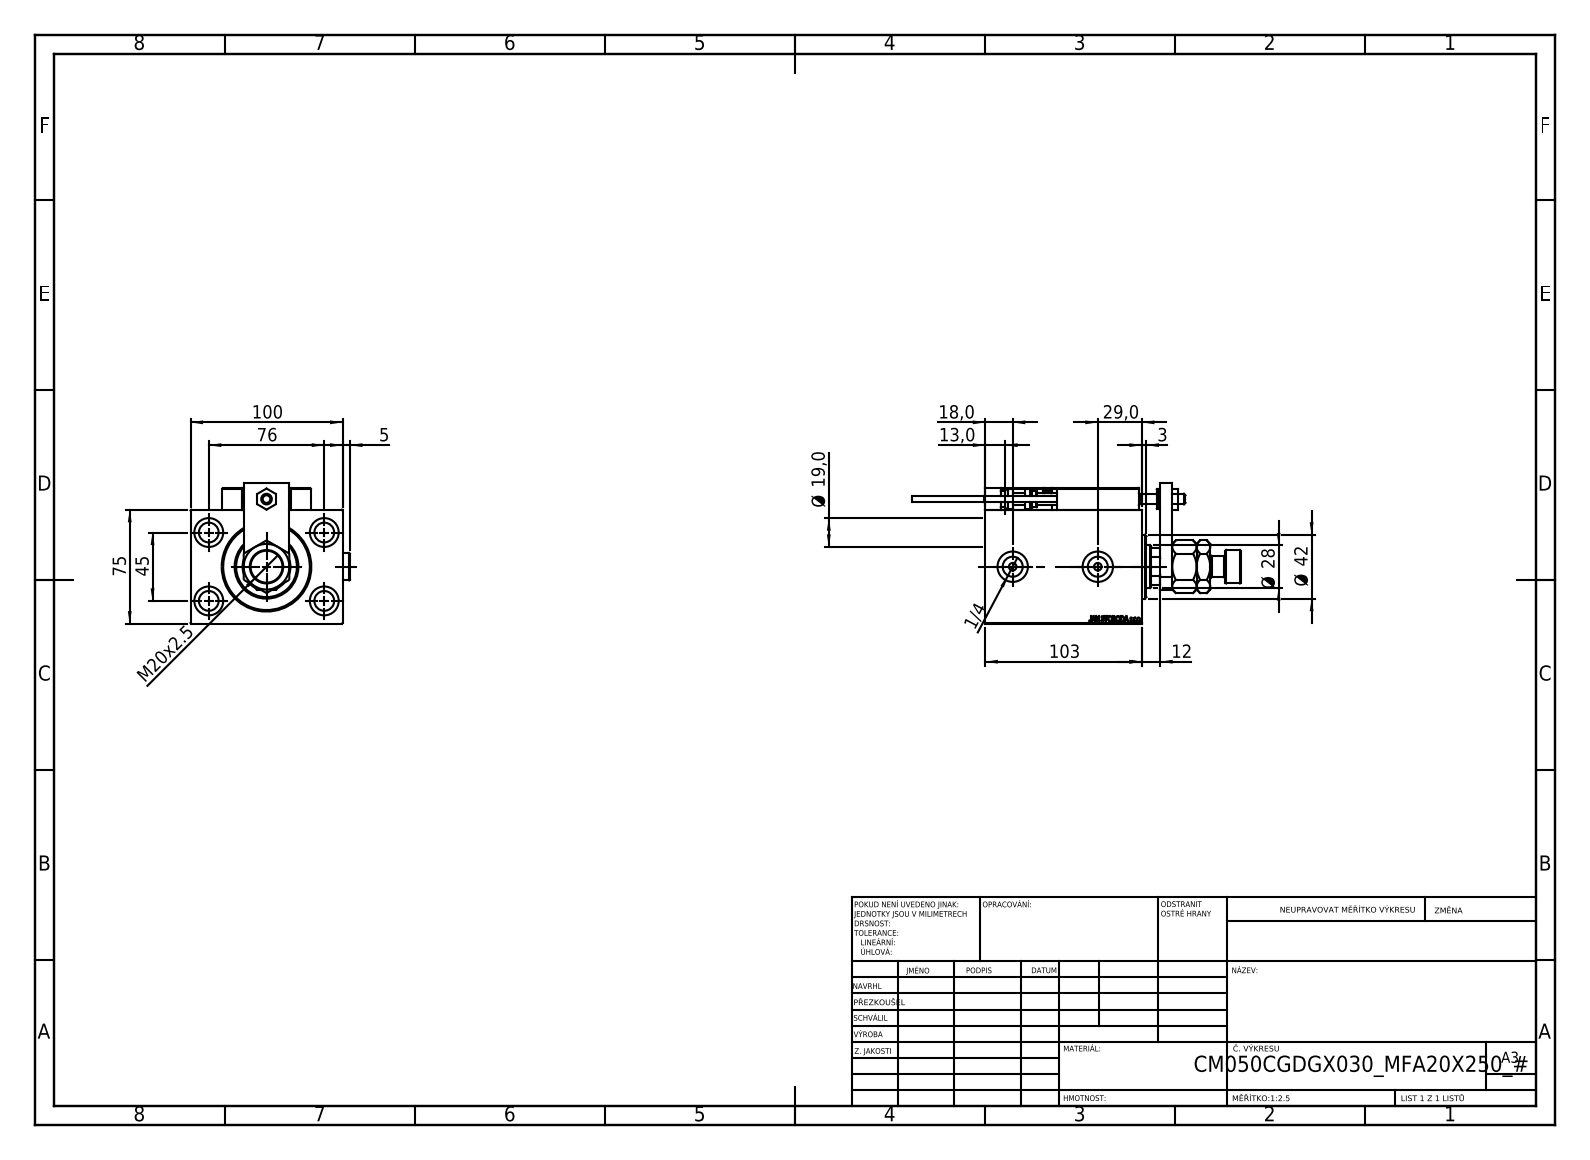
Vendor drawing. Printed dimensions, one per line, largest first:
103
100
76
75
45
Ø 42
29,0
Ø 28
M20x2.5
Ø 19,0
18,0
13,0
12
5
3
1/4
